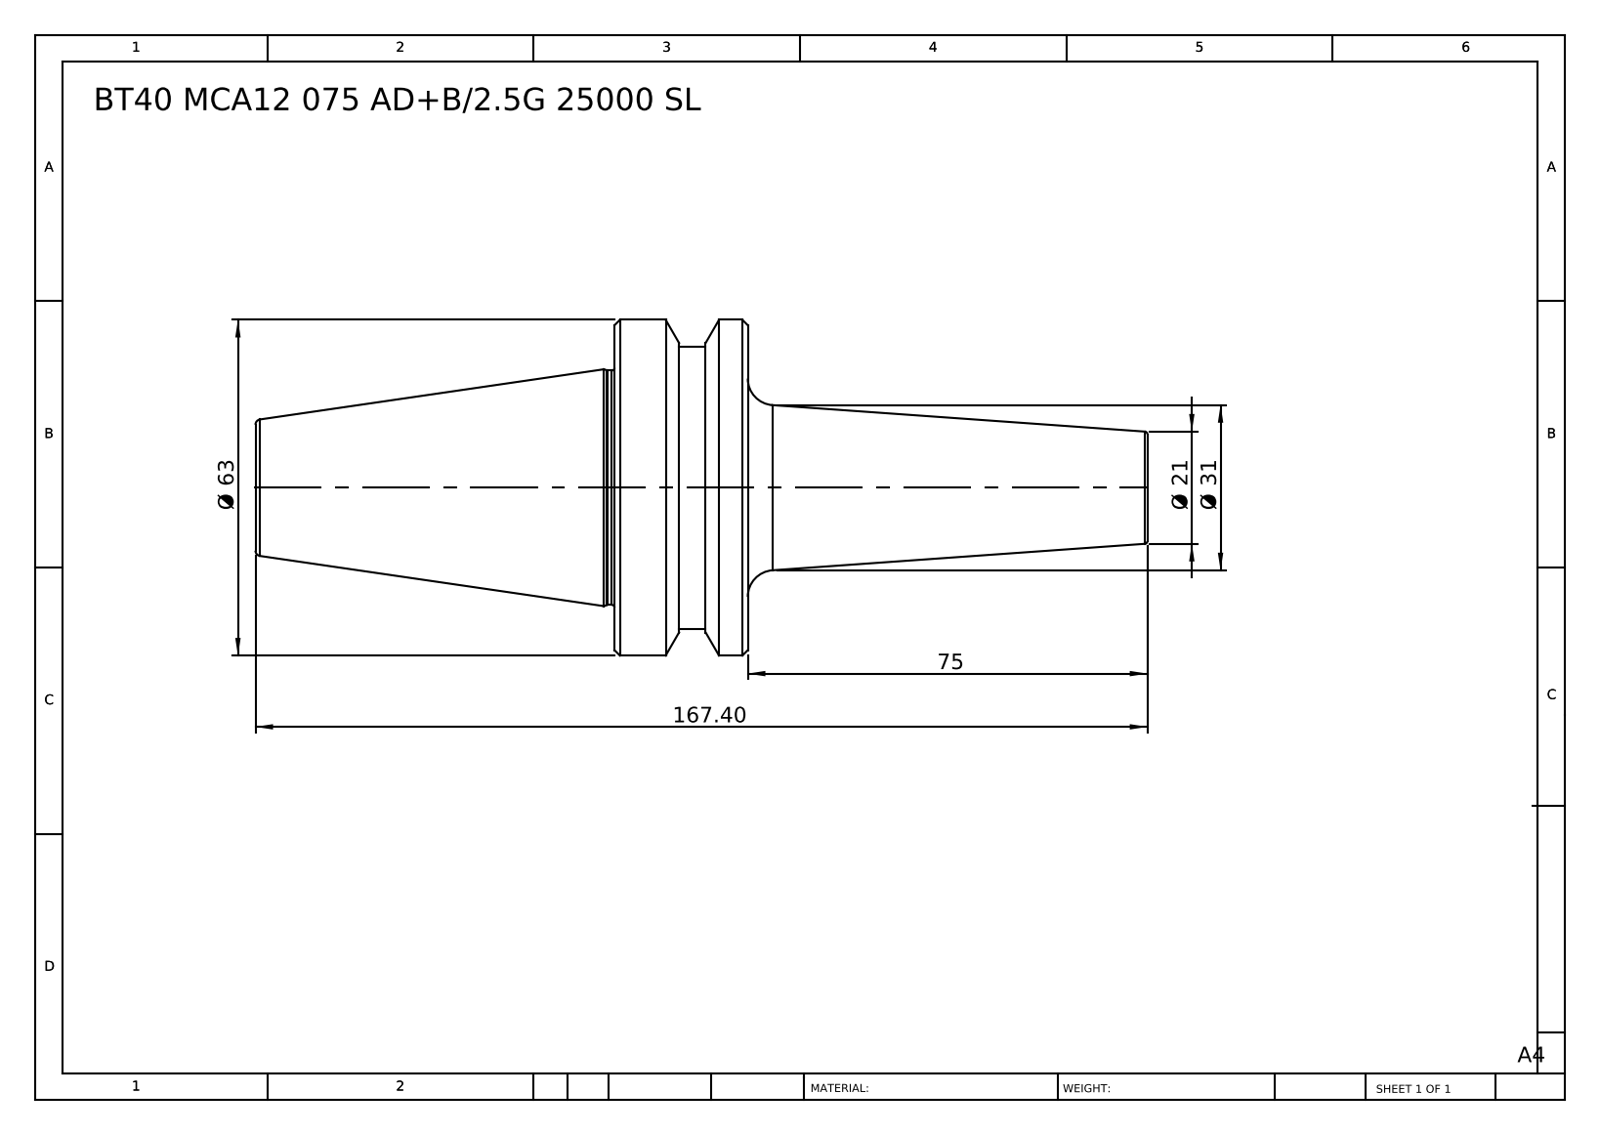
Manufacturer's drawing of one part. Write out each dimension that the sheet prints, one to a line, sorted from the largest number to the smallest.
167.40
75
Ø 63
Ø 31
Ø 21
